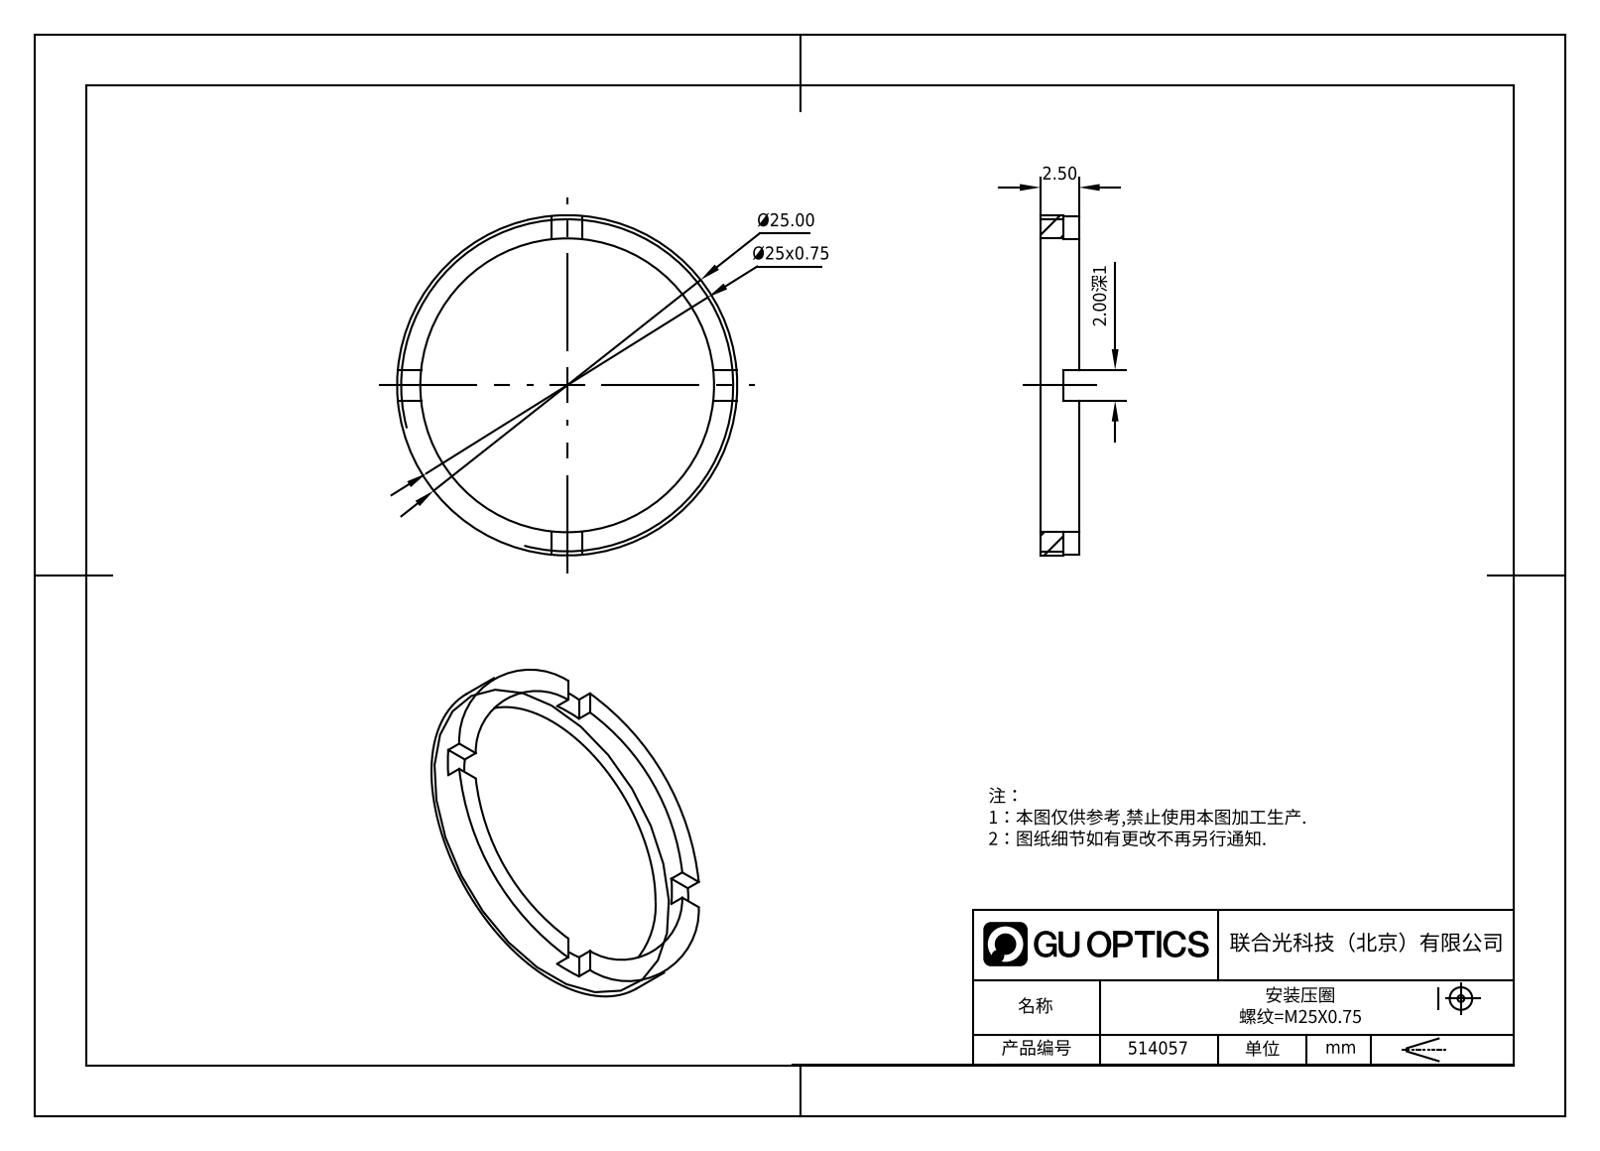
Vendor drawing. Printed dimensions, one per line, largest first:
Ø25.00
Ø25x0.75
2.50
2.00深1
